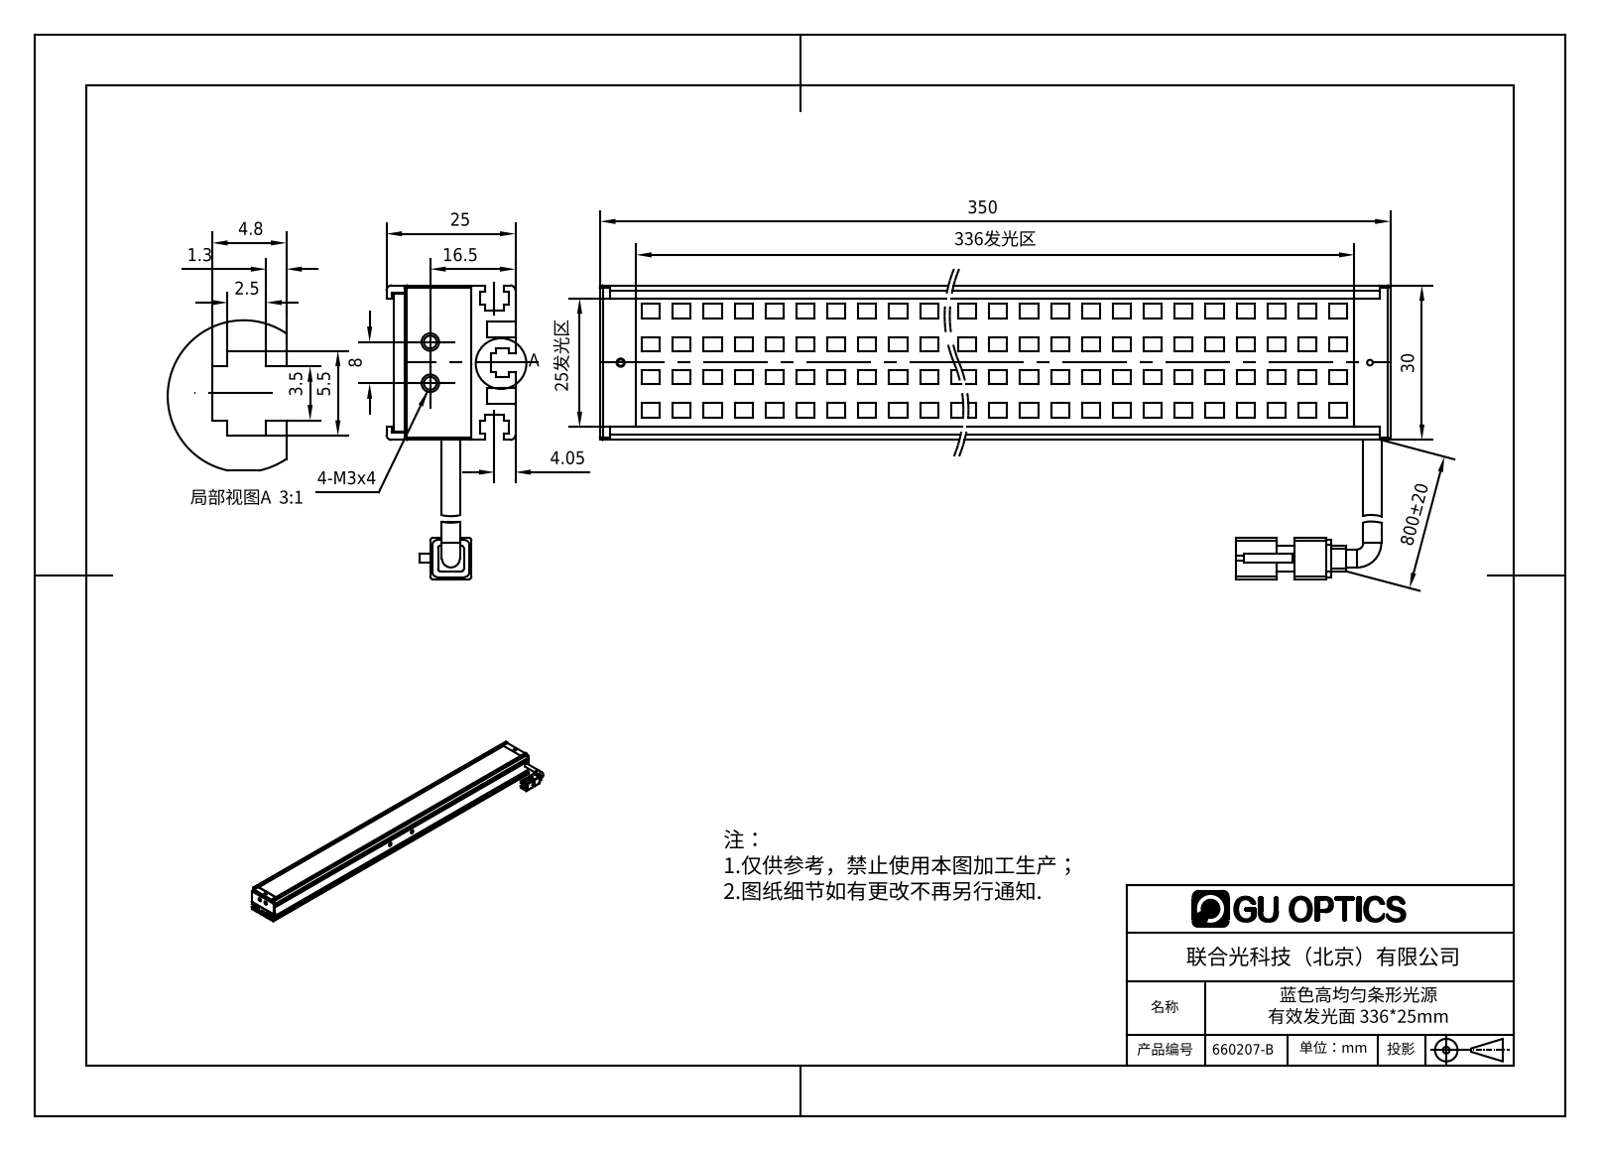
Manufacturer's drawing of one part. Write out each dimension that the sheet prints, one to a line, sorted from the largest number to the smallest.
800±20
350
336发光区
30
25发光区
25
16.5
8
5.5
4.8
4.05
3.5
2.5
1.3
